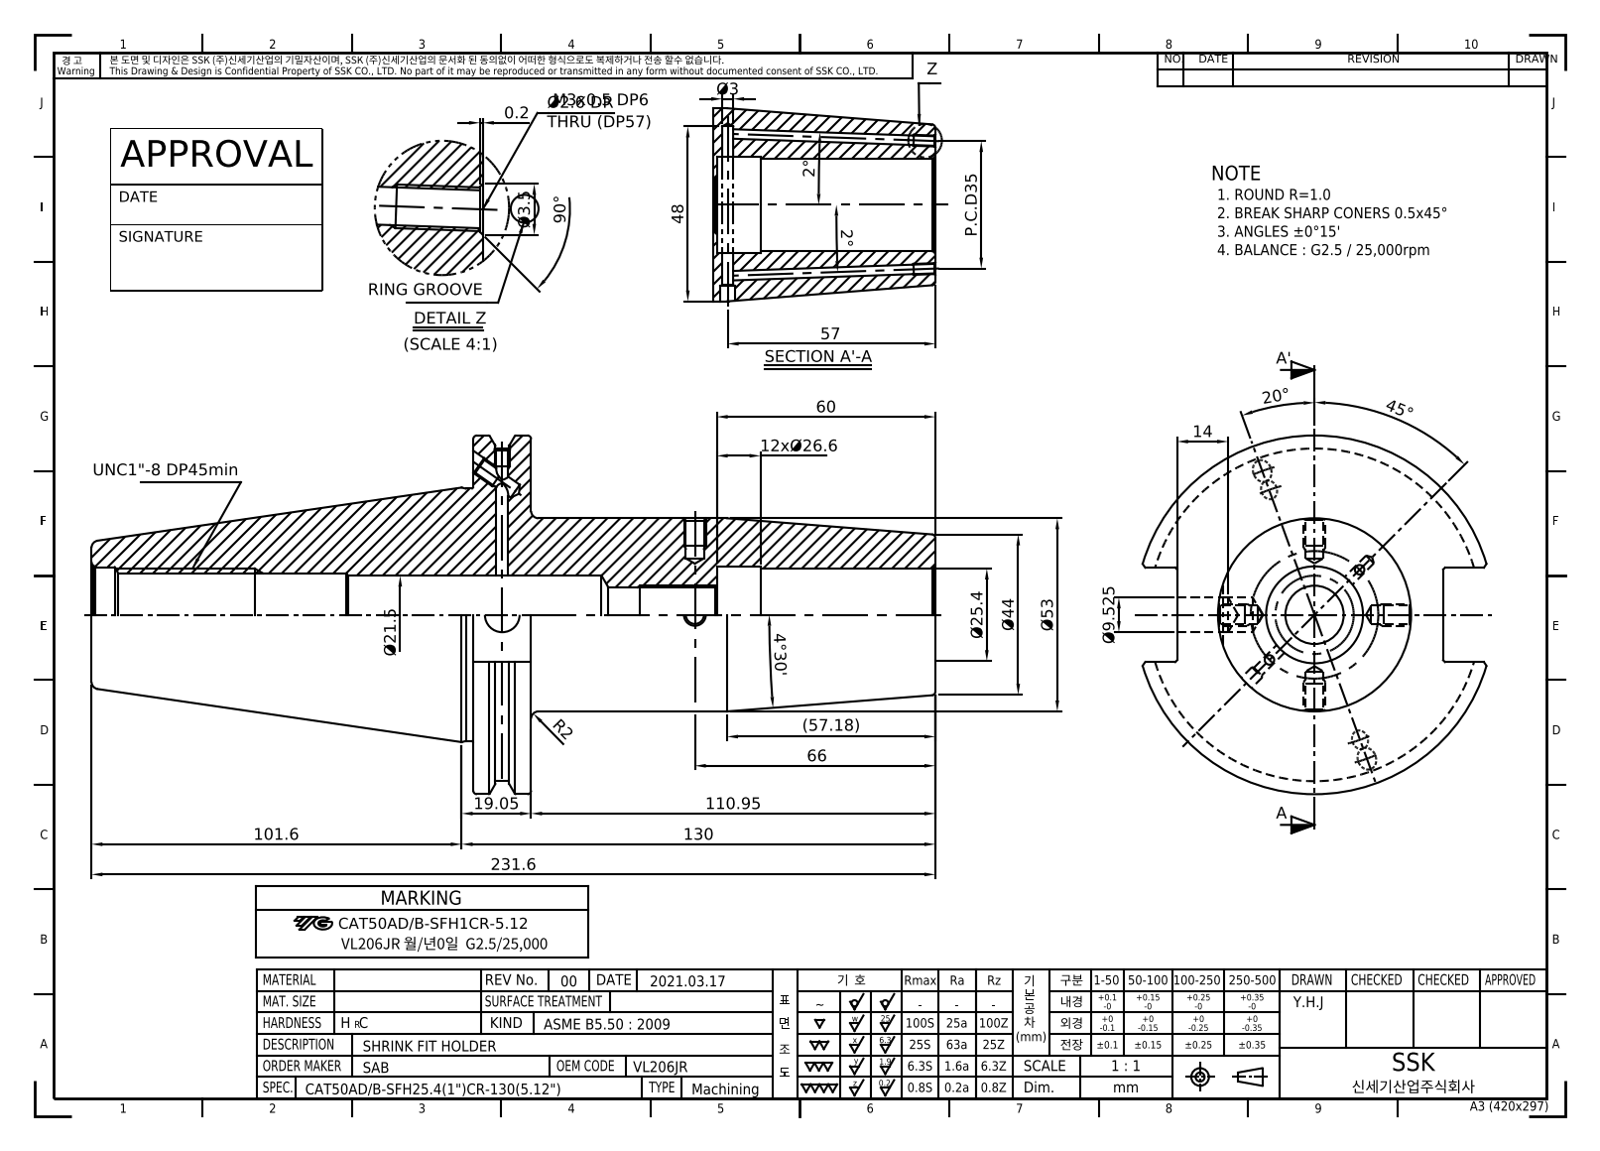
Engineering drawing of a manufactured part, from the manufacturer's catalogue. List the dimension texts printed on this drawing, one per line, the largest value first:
231.6
130
110.95
101.6
90°
66
60
(57.18)
57
Ø53
48
45°
Ø44
P.C.D35
12xØ26.6
Ø25.4
Ø21.5
20°
19.05
14
Ø9.525
4°30'
Ø3.5
Ø3
R2
2°
2°
0.2
